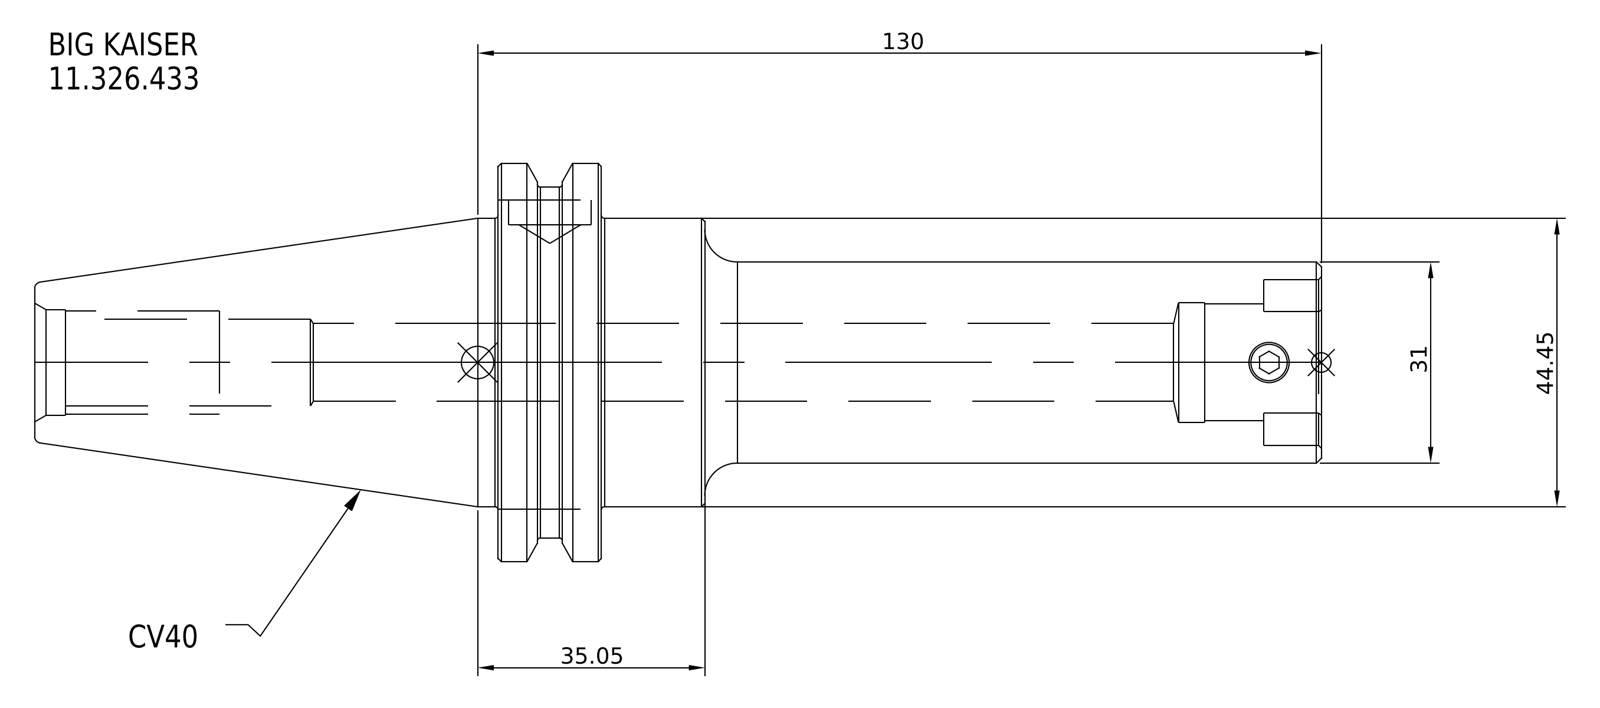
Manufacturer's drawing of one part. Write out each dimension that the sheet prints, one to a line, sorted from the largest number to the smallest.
130
44.45
35.05
31
